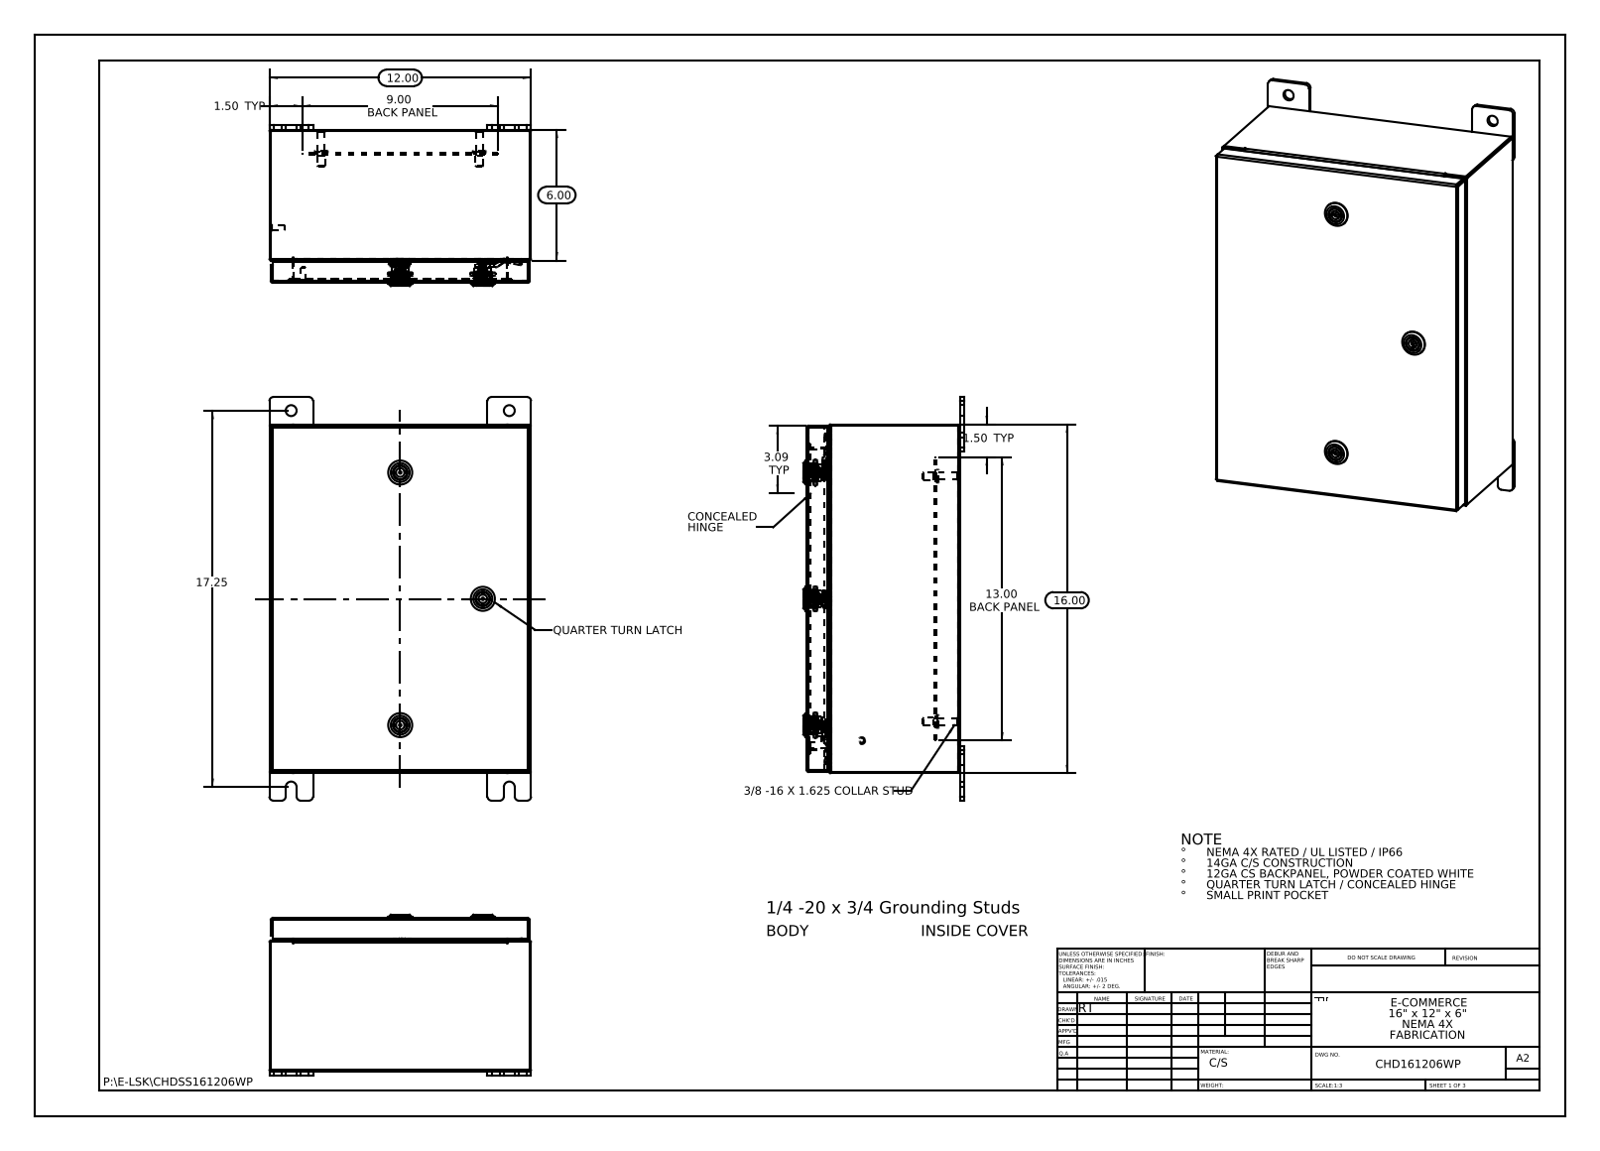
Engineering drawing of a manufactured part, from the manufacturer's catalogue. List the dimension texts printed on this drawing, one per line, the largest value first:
17.25
16.00
13.00 BACK PANEL
12.00
9.00 BACK PANEL
6.00
3.09 TYP
1.50 TYP
1.50 TYP
